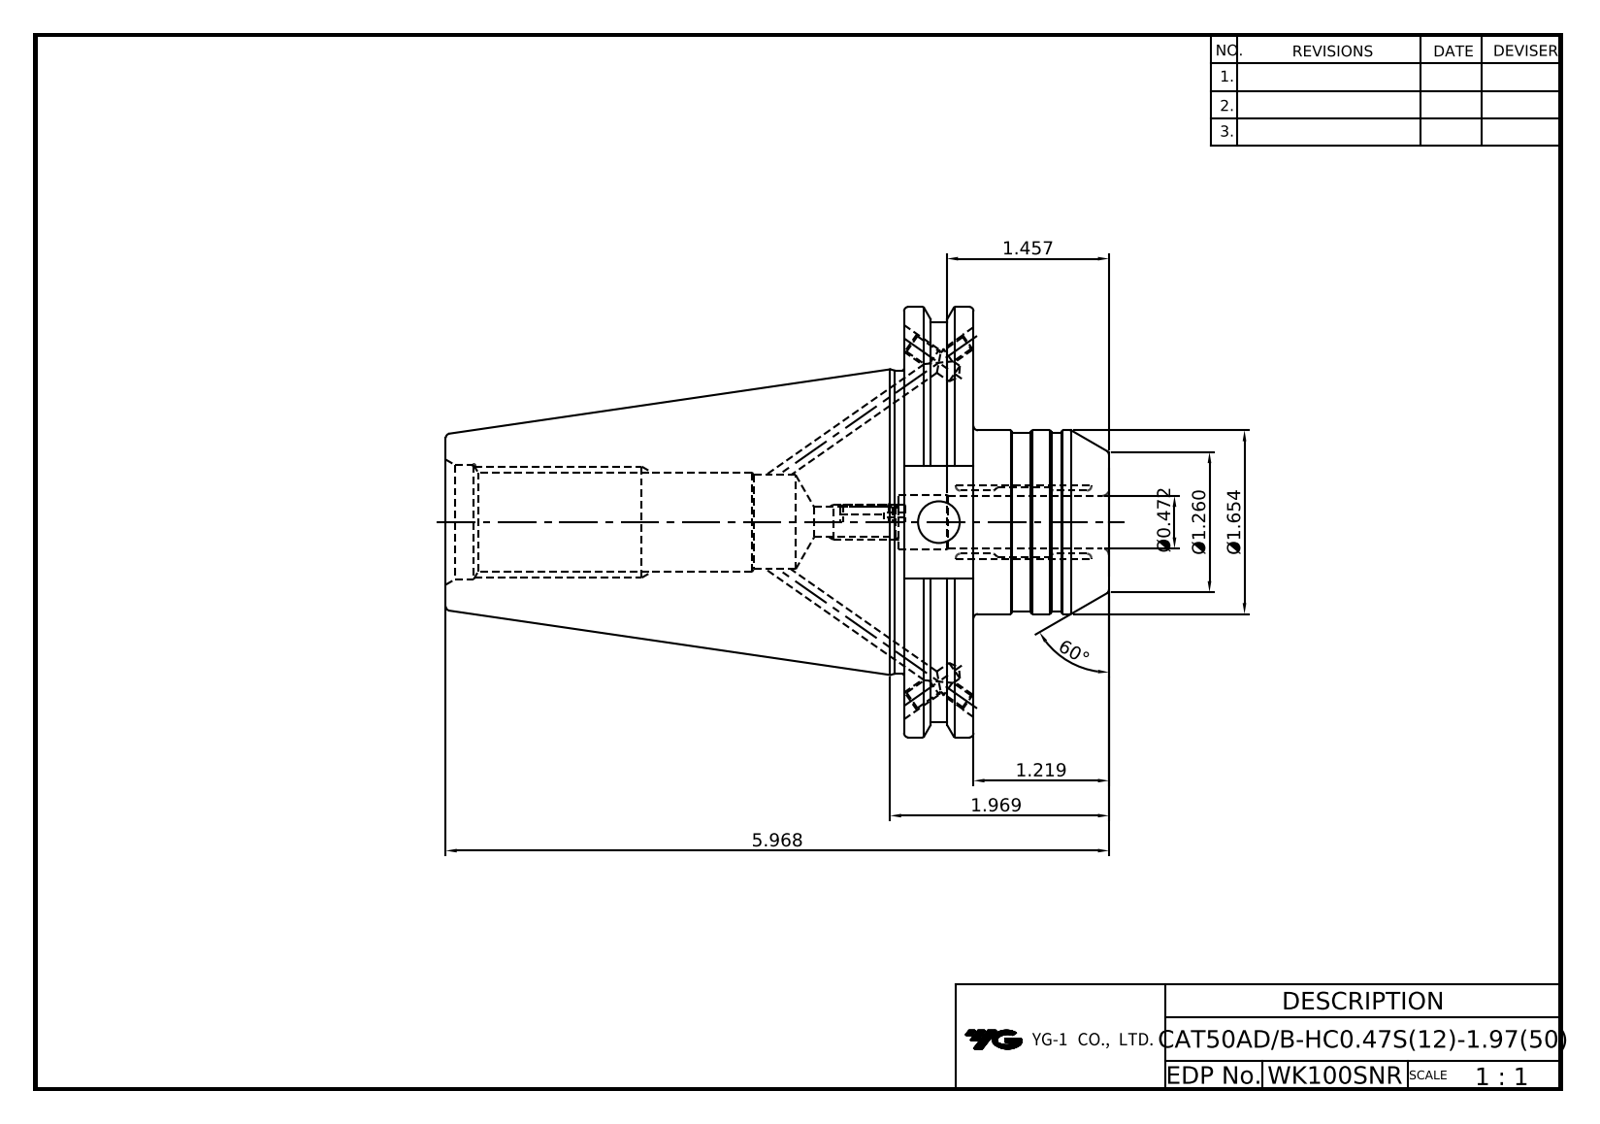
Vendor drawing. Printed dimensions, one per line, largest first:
60°
5.968
1.969
Ø1.654
1.457
Ø1.260
1.219
Ø0.472
